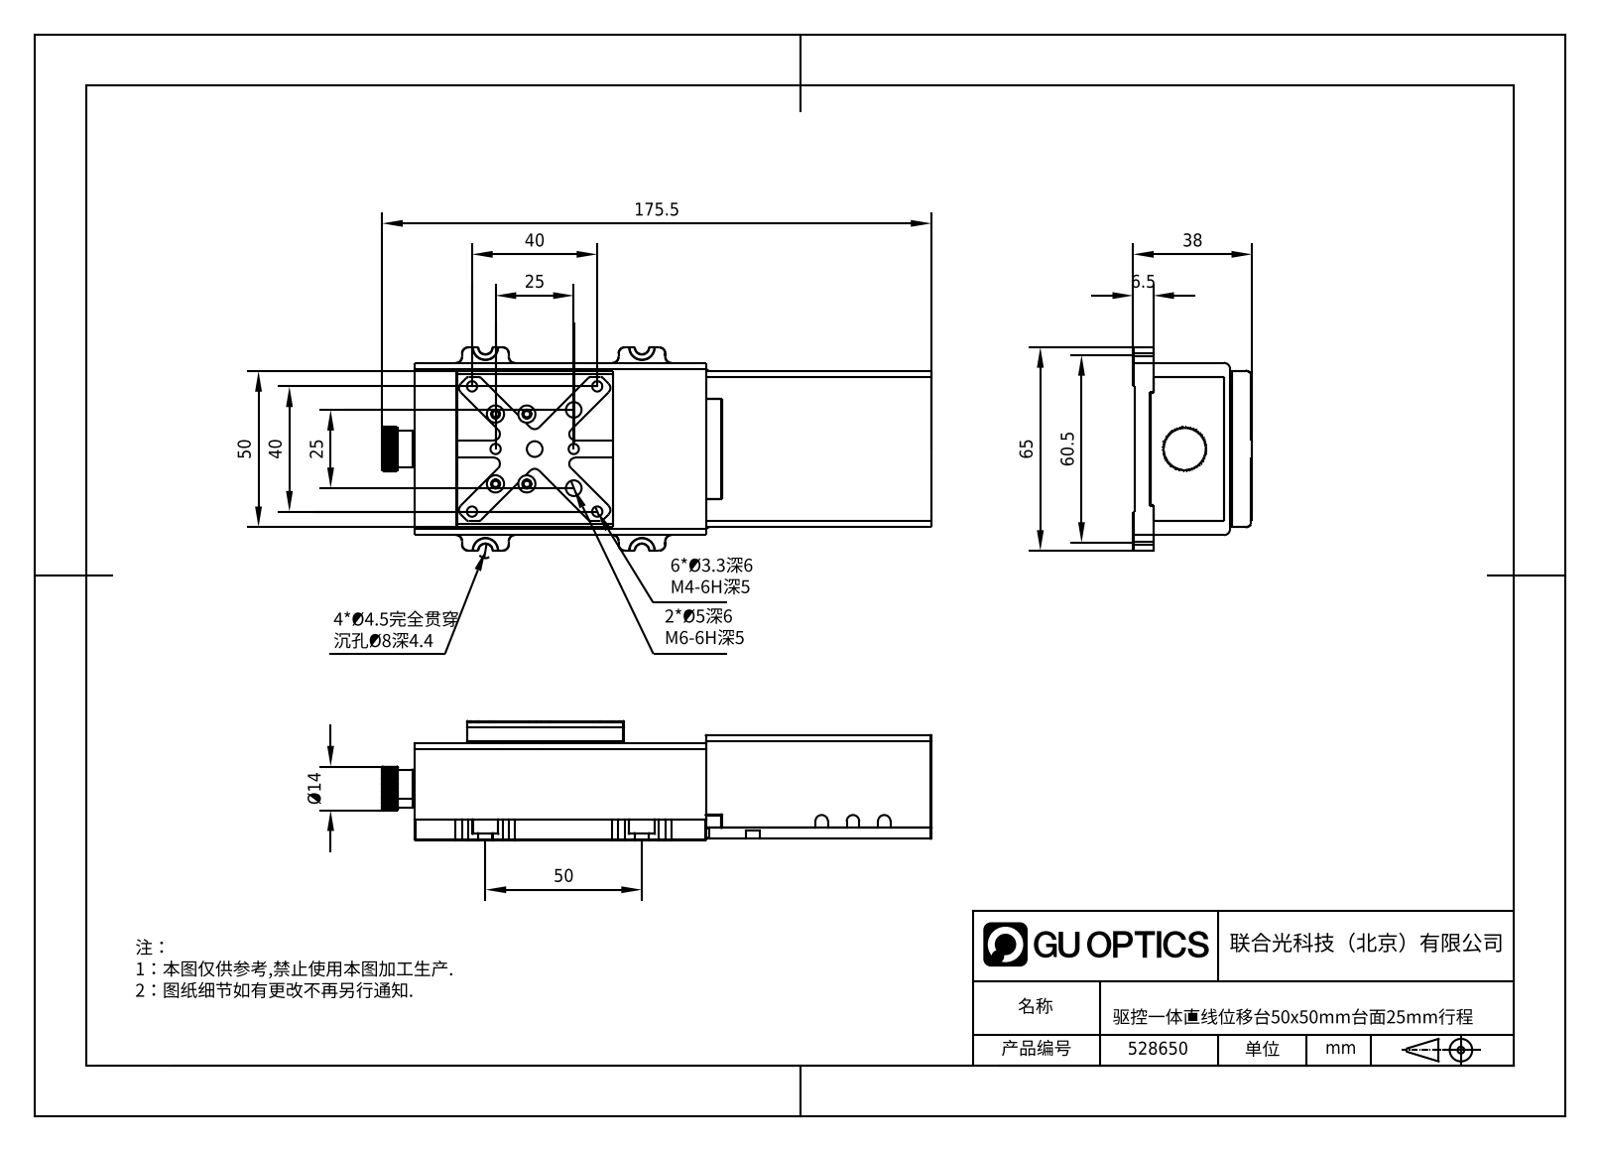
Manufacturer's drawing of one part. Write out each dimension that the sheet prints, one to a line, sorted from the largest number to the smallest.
175.5
65
60.5
50
50
40
40
38
25
25
Ø14
6.5
